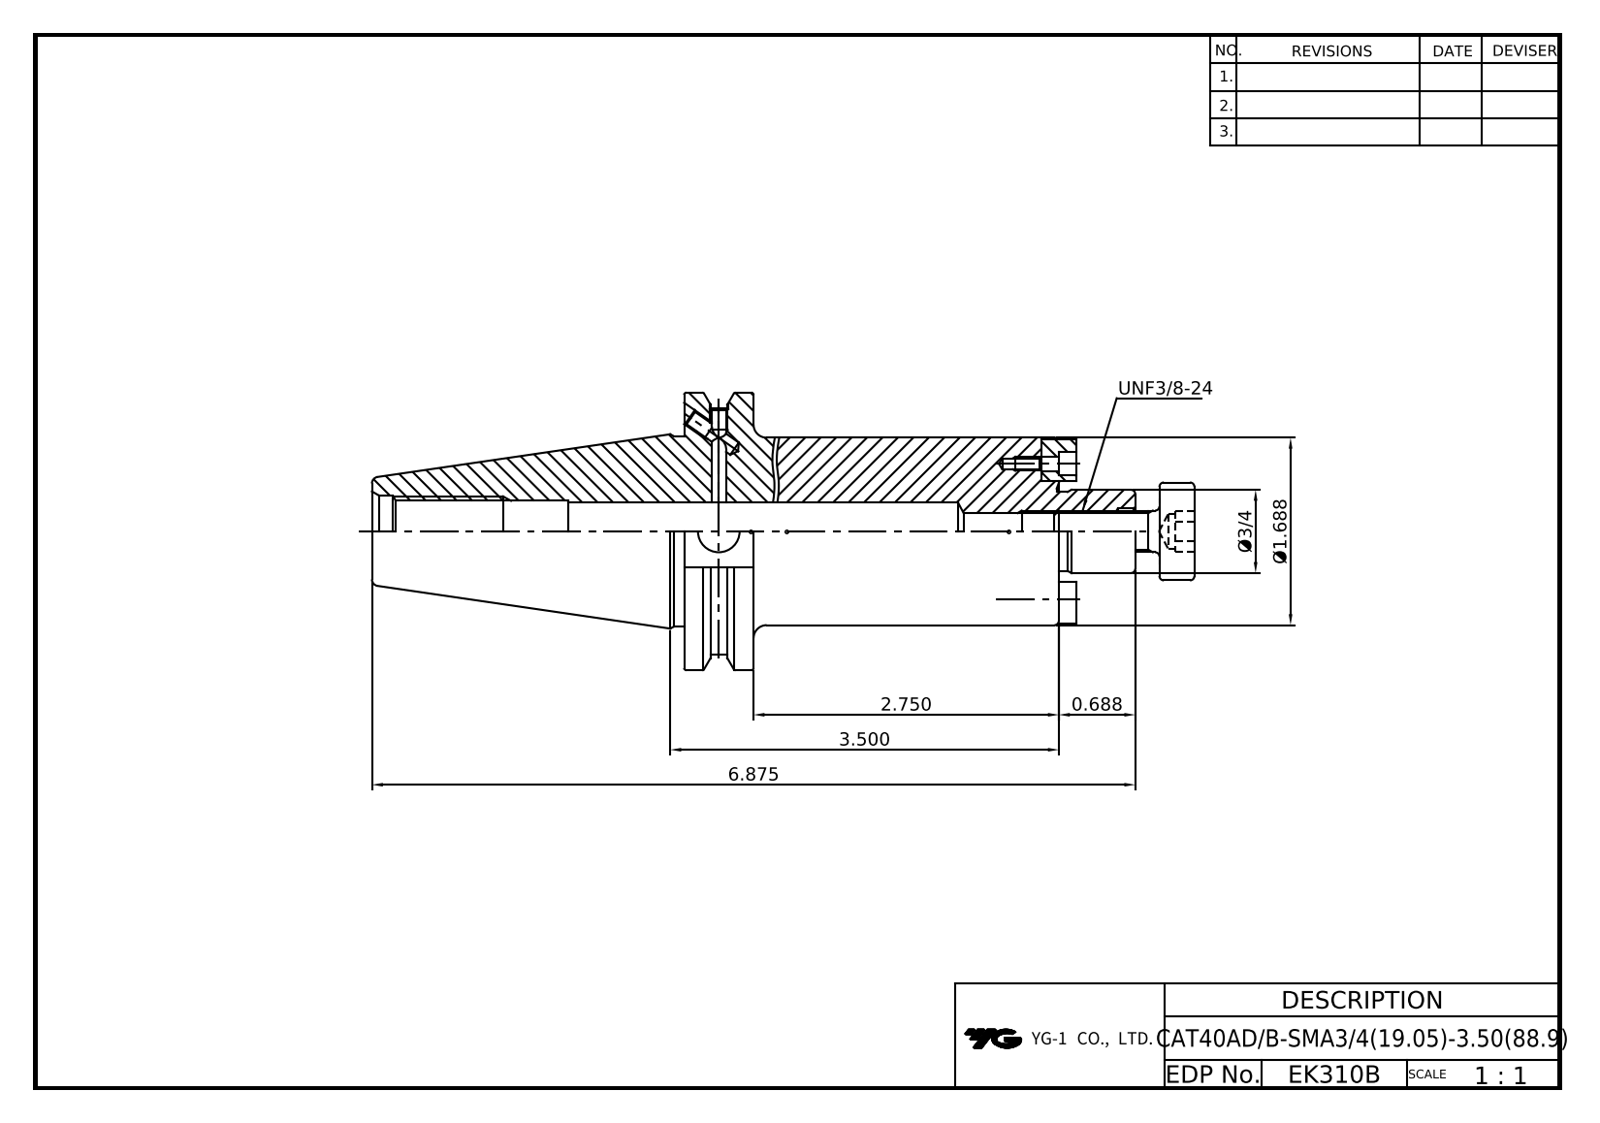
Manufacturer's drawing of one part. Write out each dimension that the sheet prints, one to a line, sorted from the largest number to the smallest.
6.875
3.500
2.750
Ø1.688
Ø3/4
0.688
